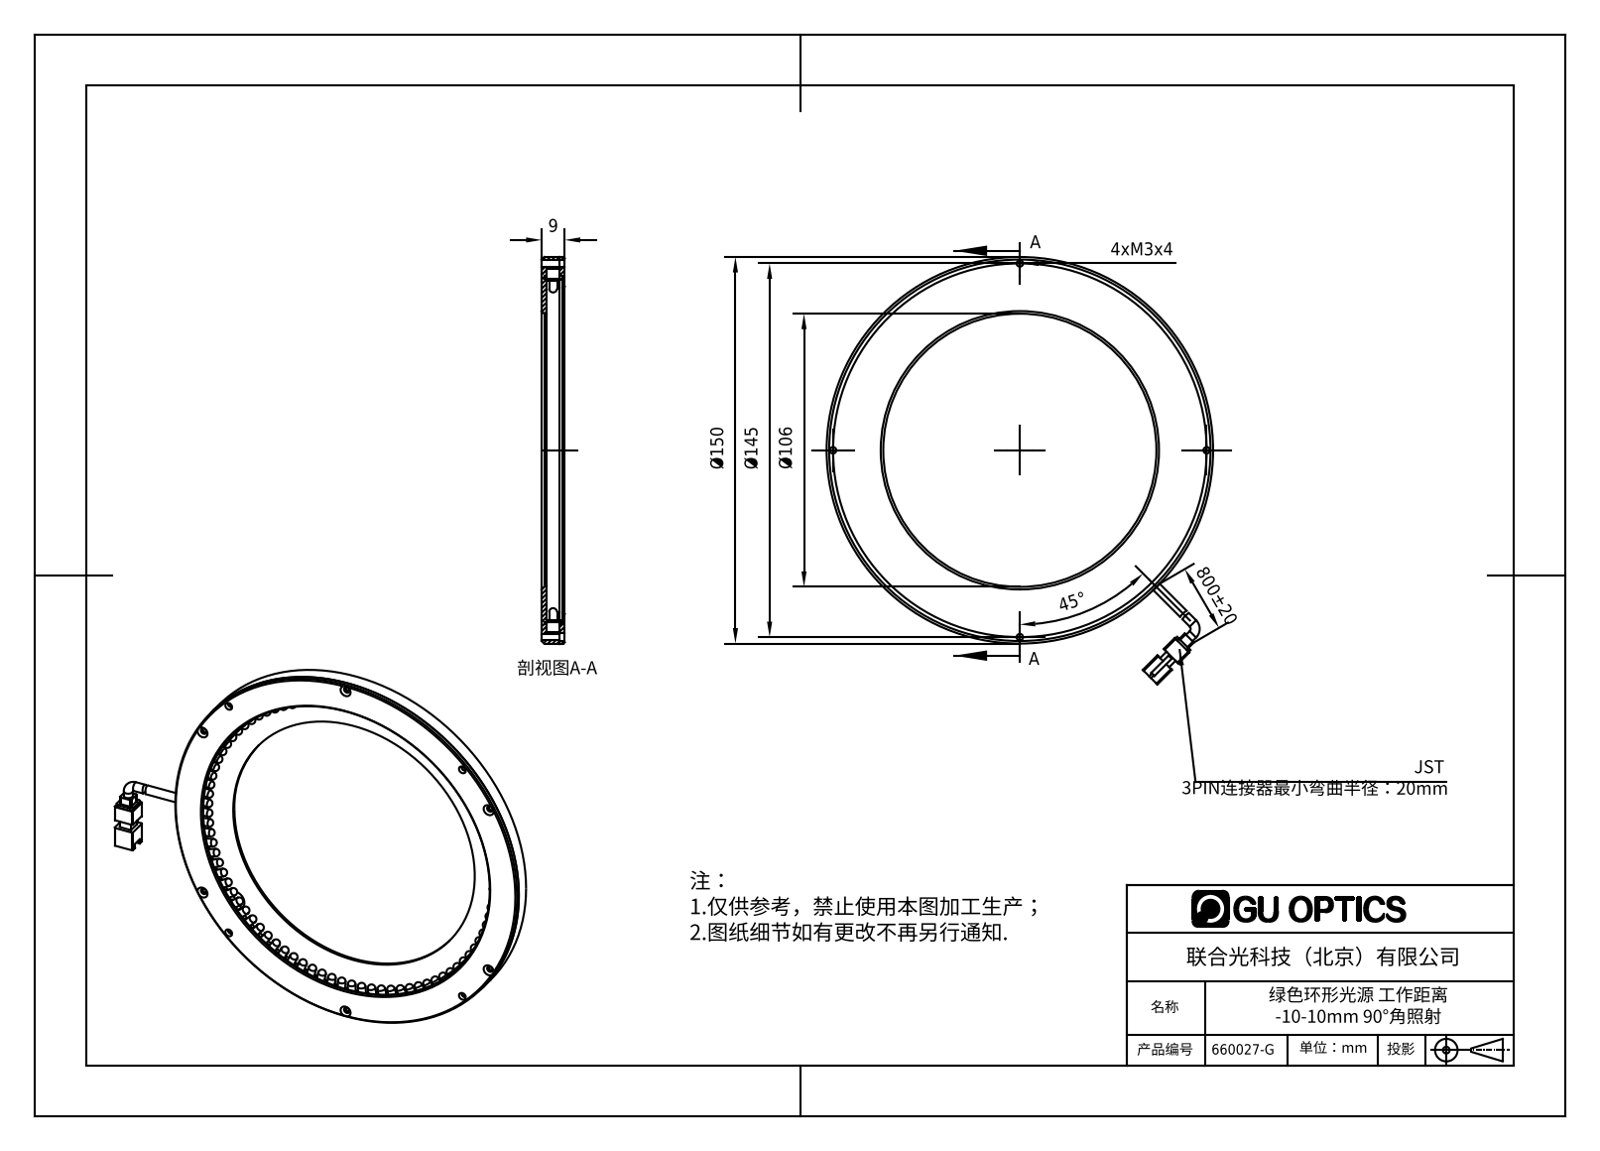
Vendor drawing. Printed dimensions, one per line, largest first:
800±20
Ø150
Ø145
Ø106
45°
9
4xM3x4
